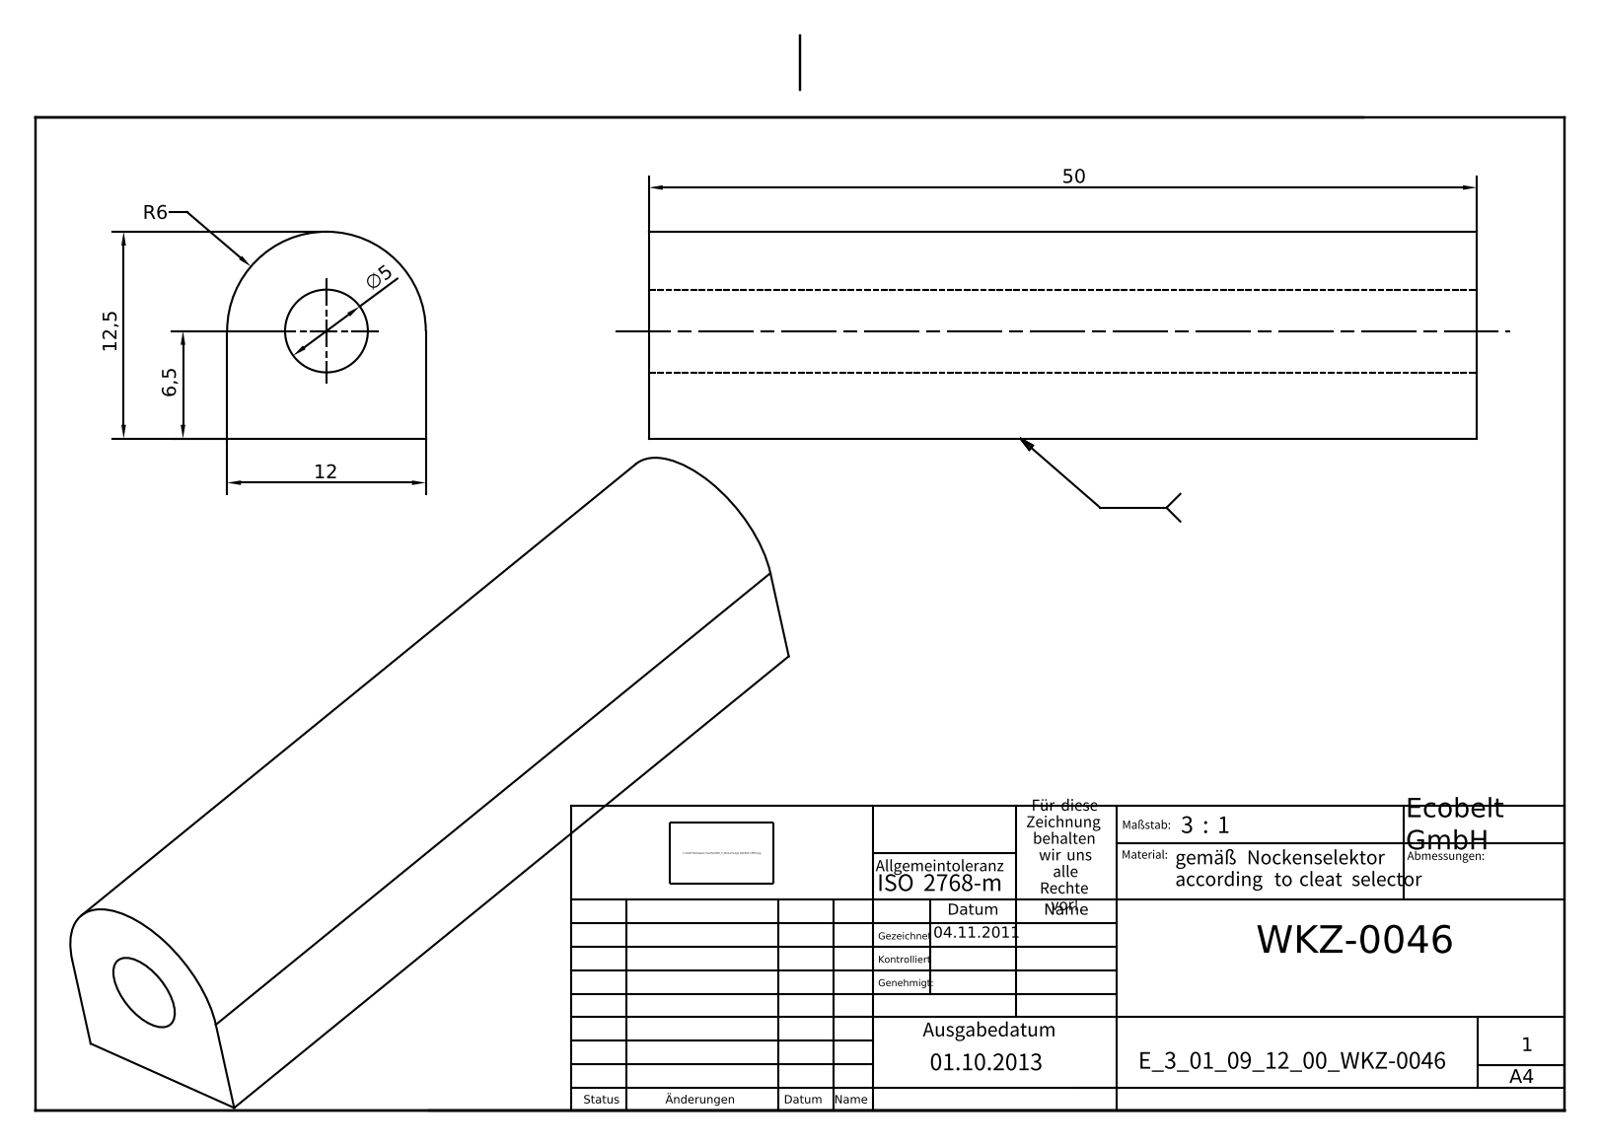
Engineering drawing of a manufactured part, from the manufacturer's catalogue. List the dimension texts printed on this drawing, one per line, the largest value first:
50
12,5
12
6,5
R6
∅5
